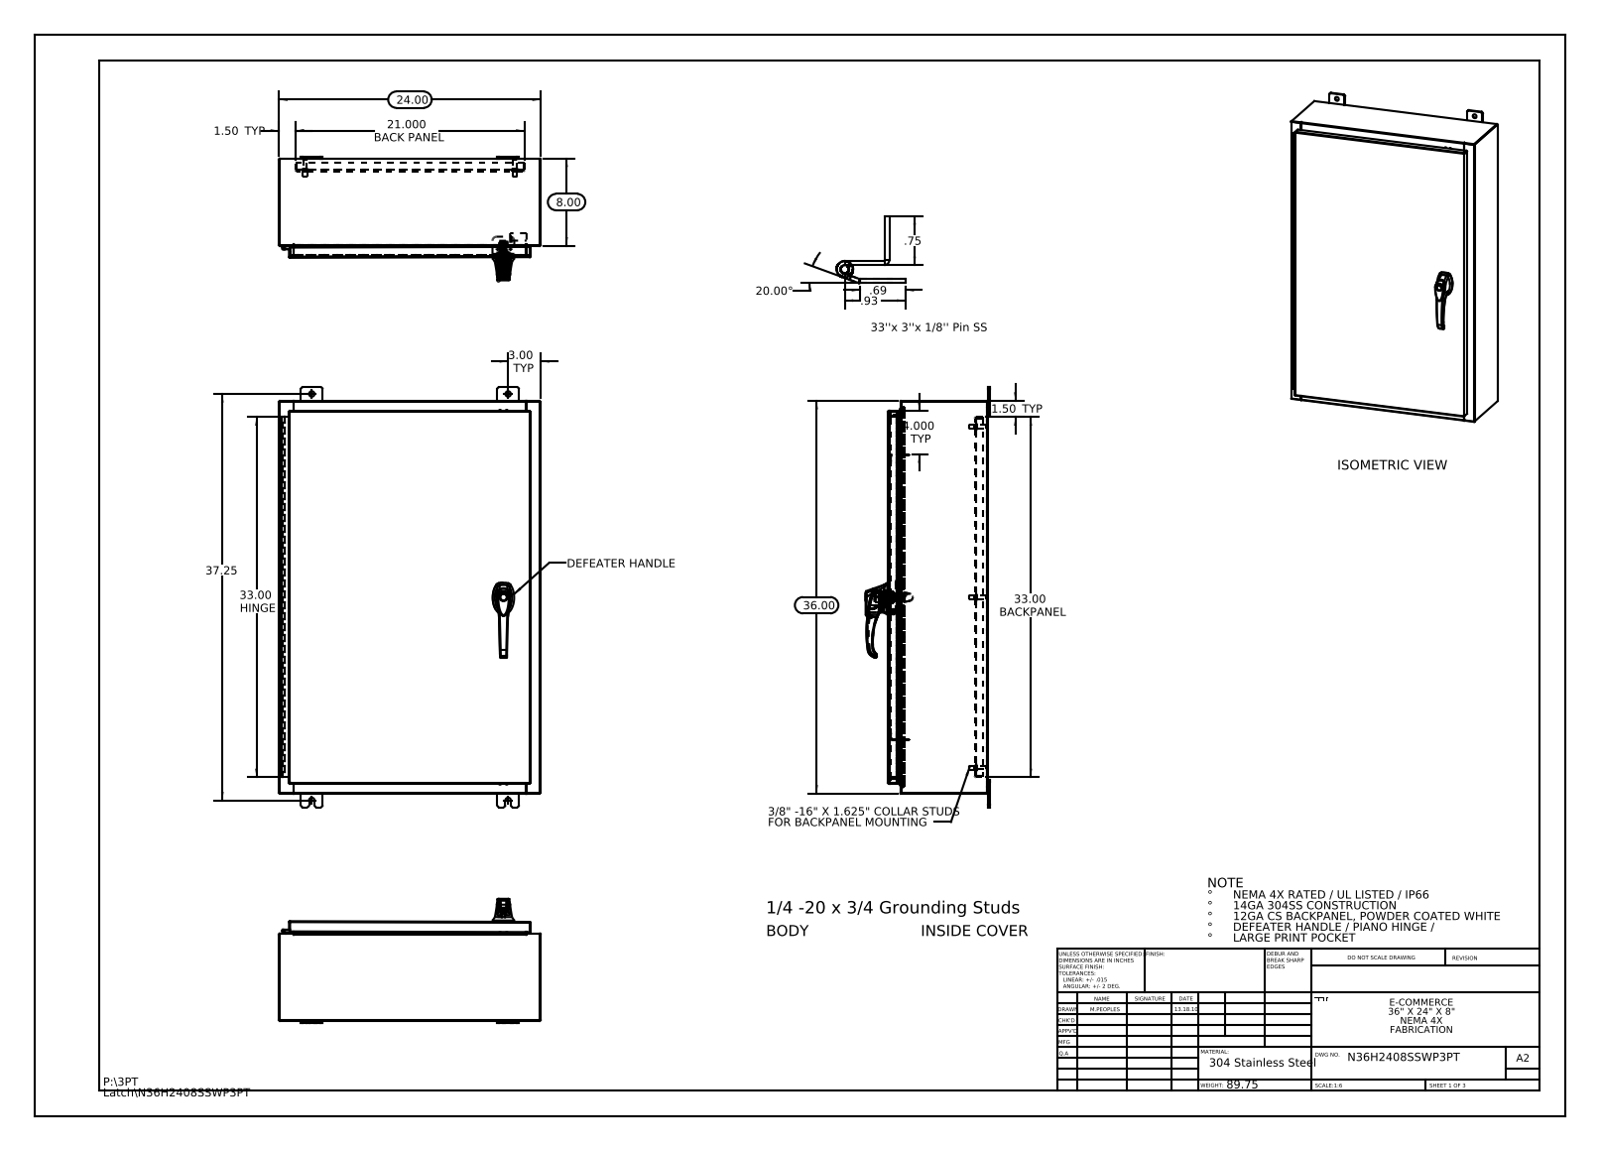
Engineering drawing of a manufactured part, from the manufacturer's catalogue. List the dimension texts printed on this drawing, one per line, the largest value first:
37.25
36.00
33.00 HINGE
33.00 BACKPANEL
24.00
21.000 BACK PANEL
20.00°
8.00
4.000 TYP
3.00 TYP
1.50 TYP
1.50 TYP
.93
.75
.69
